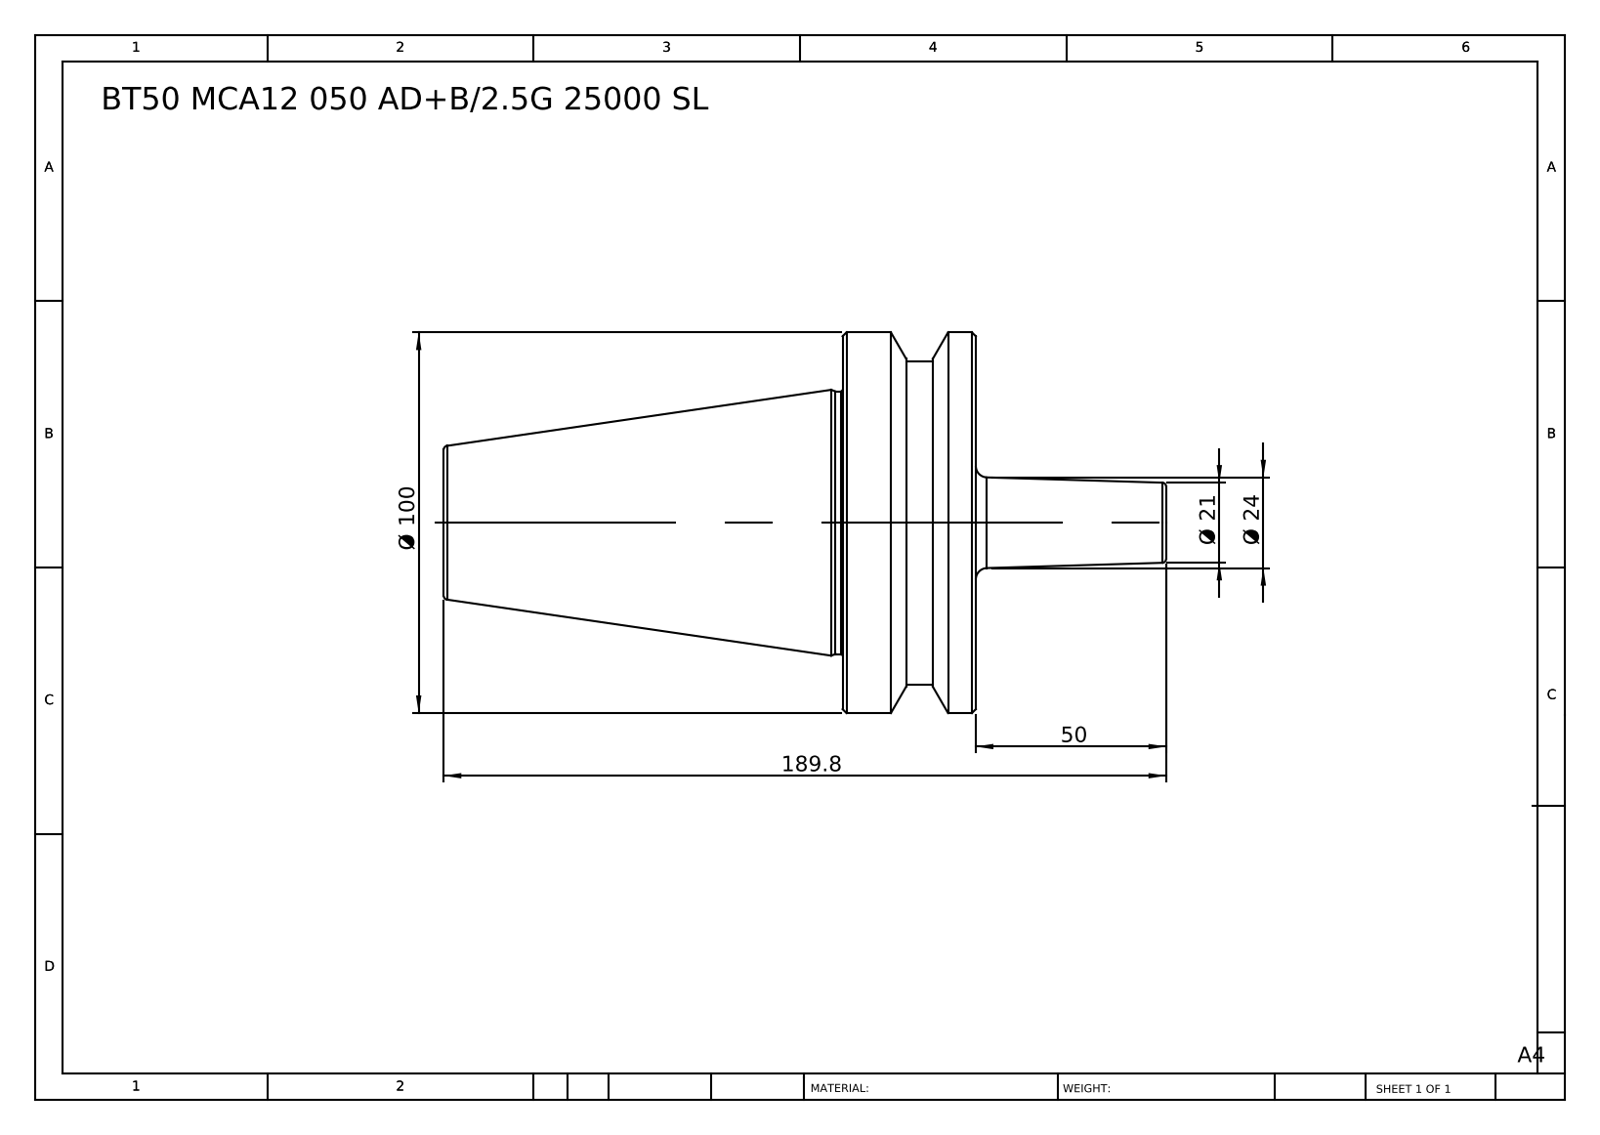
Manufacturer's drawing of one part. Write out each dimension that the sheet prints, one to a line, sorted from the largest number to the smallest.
189.8
Ø 100
50
Ø 24
Ø 21
